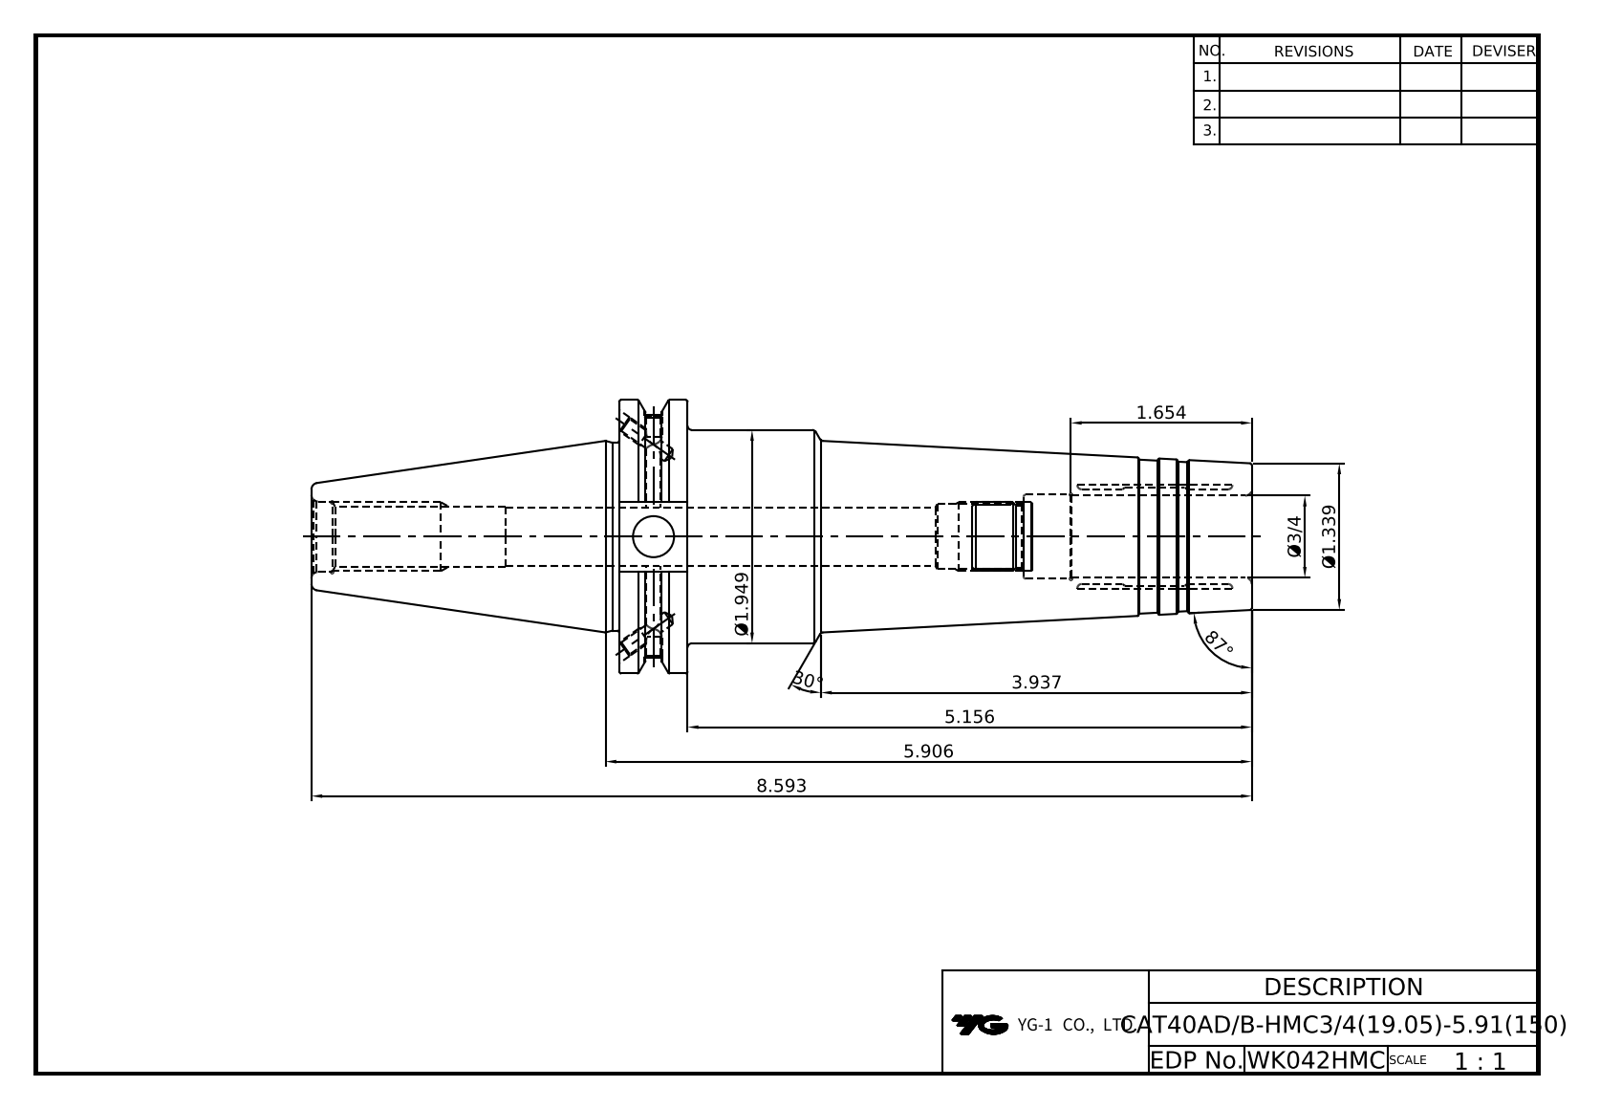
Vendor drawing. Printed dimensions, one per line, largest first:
87°
30°
8.593
5.906
5.156
3.937
Ø1.949
1.654
Ø1.339
Ø3/4
